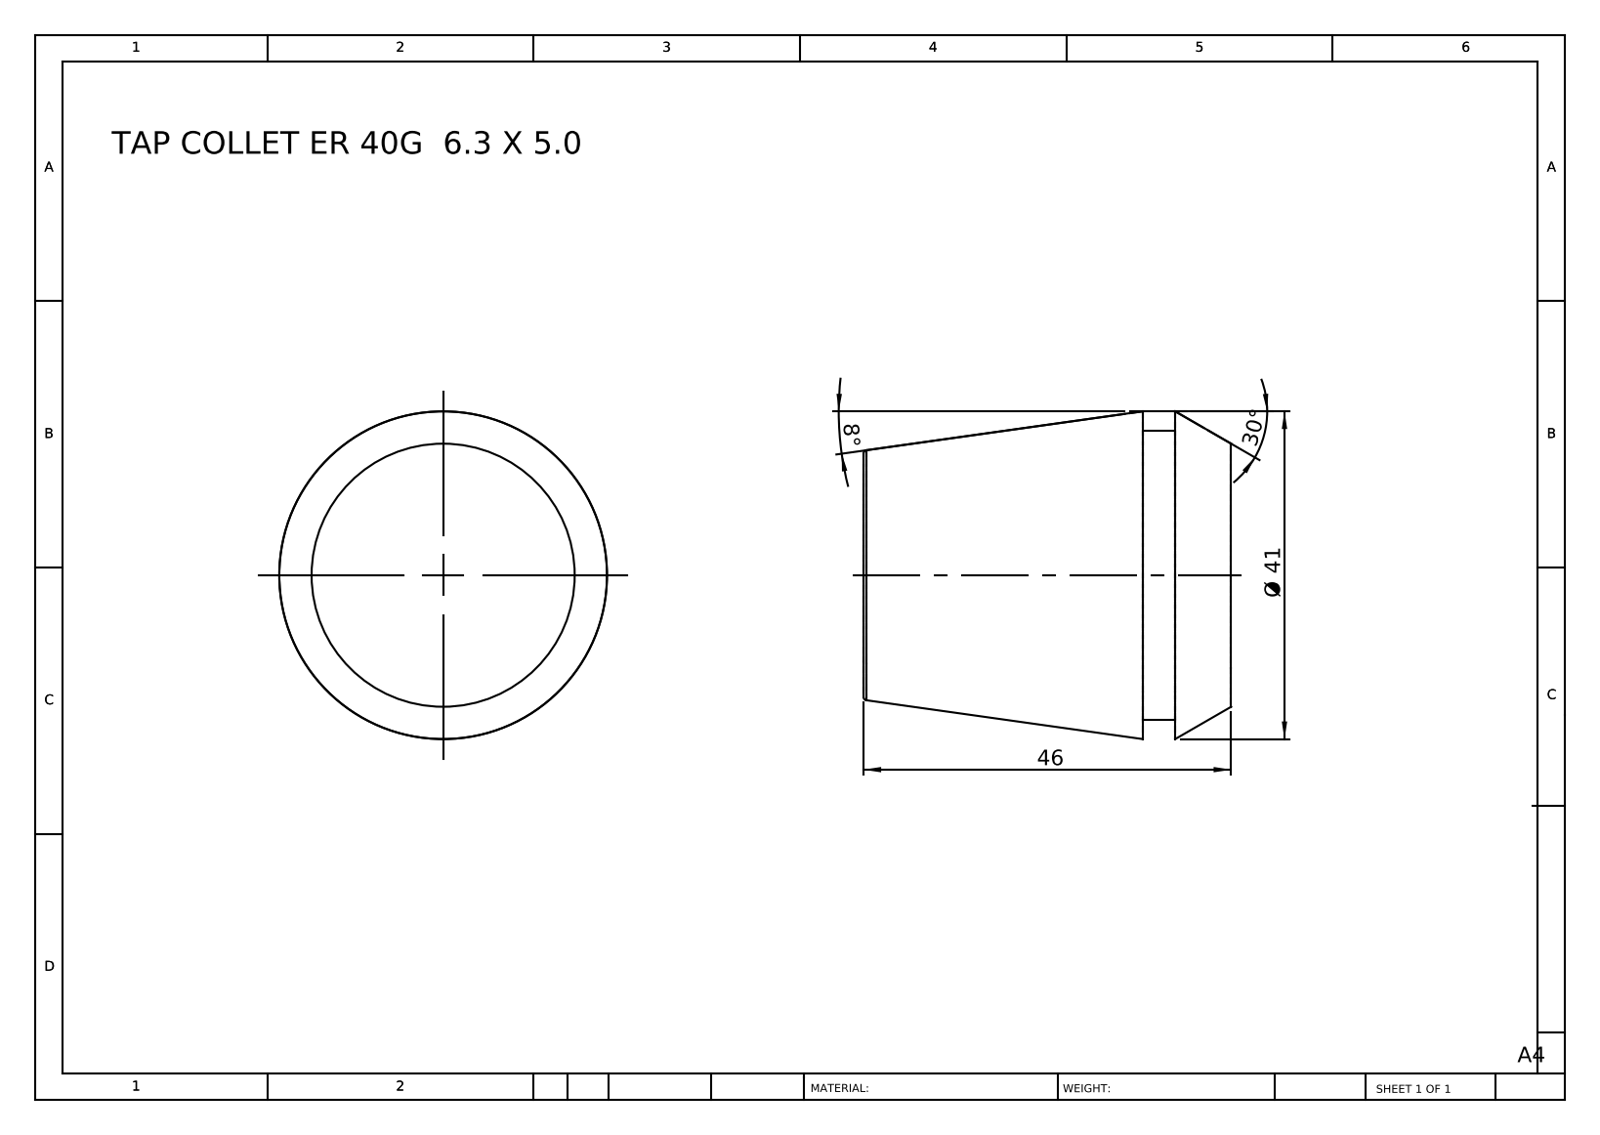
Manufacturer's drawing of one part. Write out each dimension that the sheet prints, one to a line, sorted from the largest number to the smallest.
46
Ø 41
30°
8°
